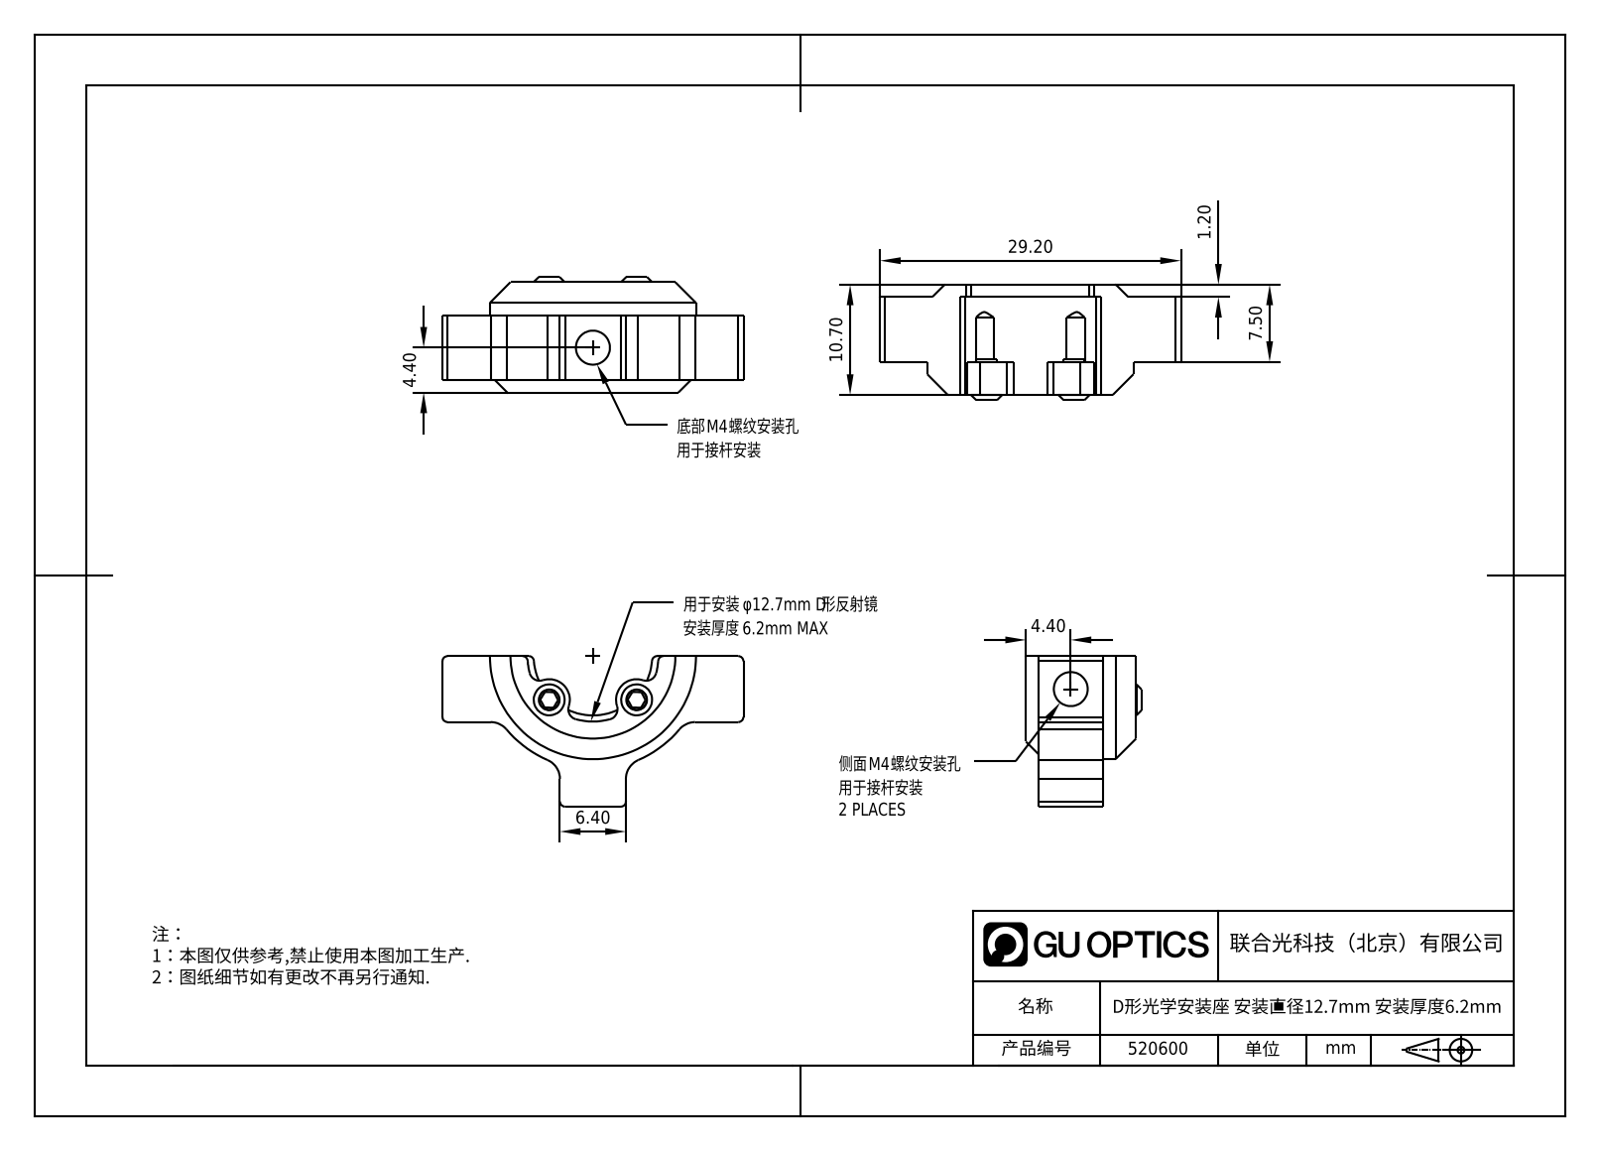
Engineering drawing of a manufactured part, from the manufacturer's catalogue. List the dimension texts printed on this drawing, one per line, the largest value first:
29.20
10.70
7.50
6.40
4.40
4.40
1.20
